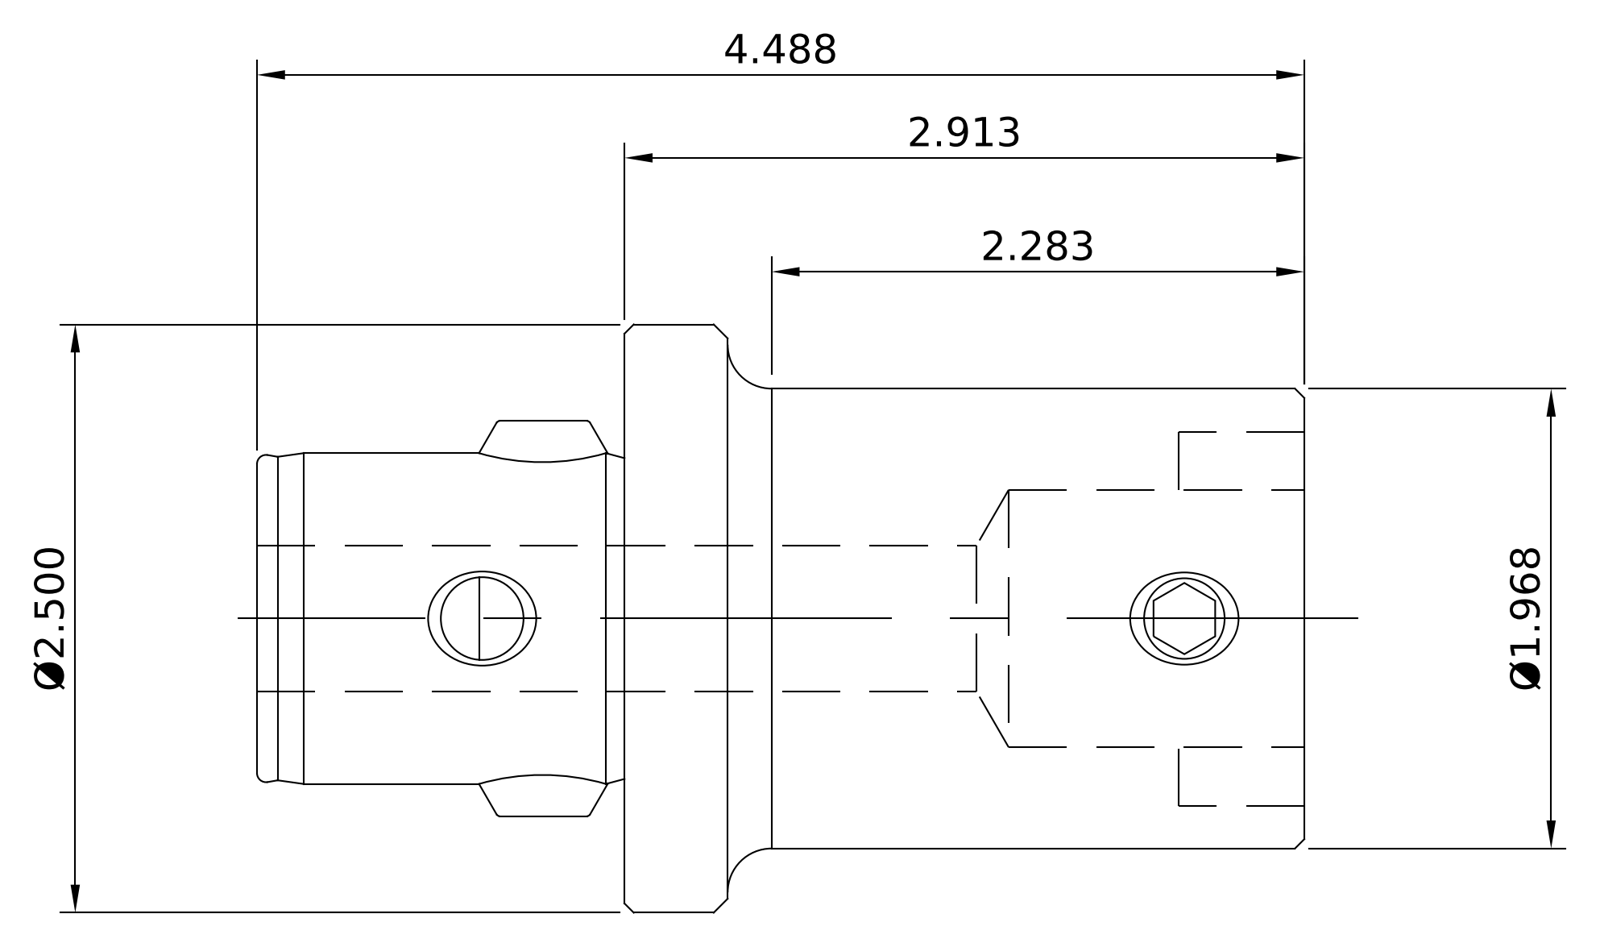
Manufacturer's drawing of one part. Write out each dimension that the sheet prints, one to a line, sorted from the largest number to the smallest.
4.488
2.913
Ø2.500
2.283
Ø1.968
